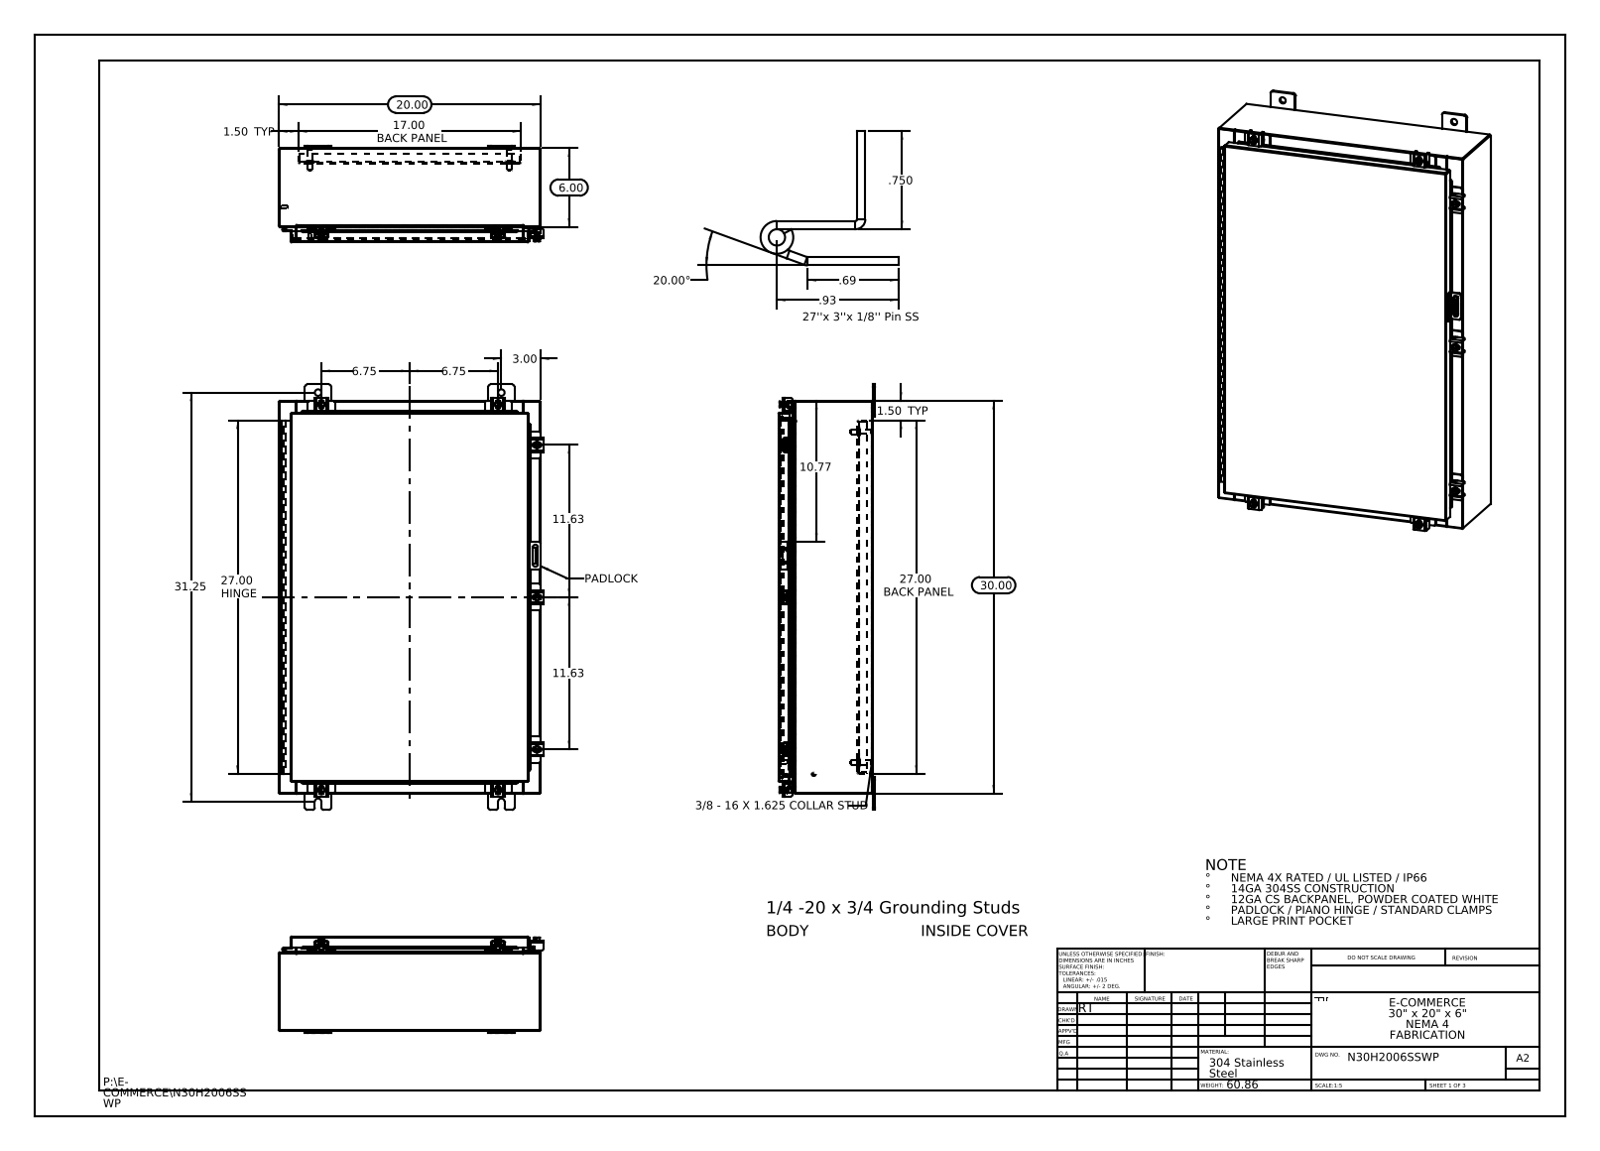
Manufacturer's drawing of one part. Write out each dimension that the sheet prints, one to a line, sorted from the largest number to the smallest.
31.25
30.00
27.00 HINGE
27.00 BACK PANEL
20.00
20.00°
17.00 BACK PANEL
11.63
11.63
10.77
6.75
6.75
6.00
3.00
1.50 TYP
1.50 TYP
.93
.750
.69
